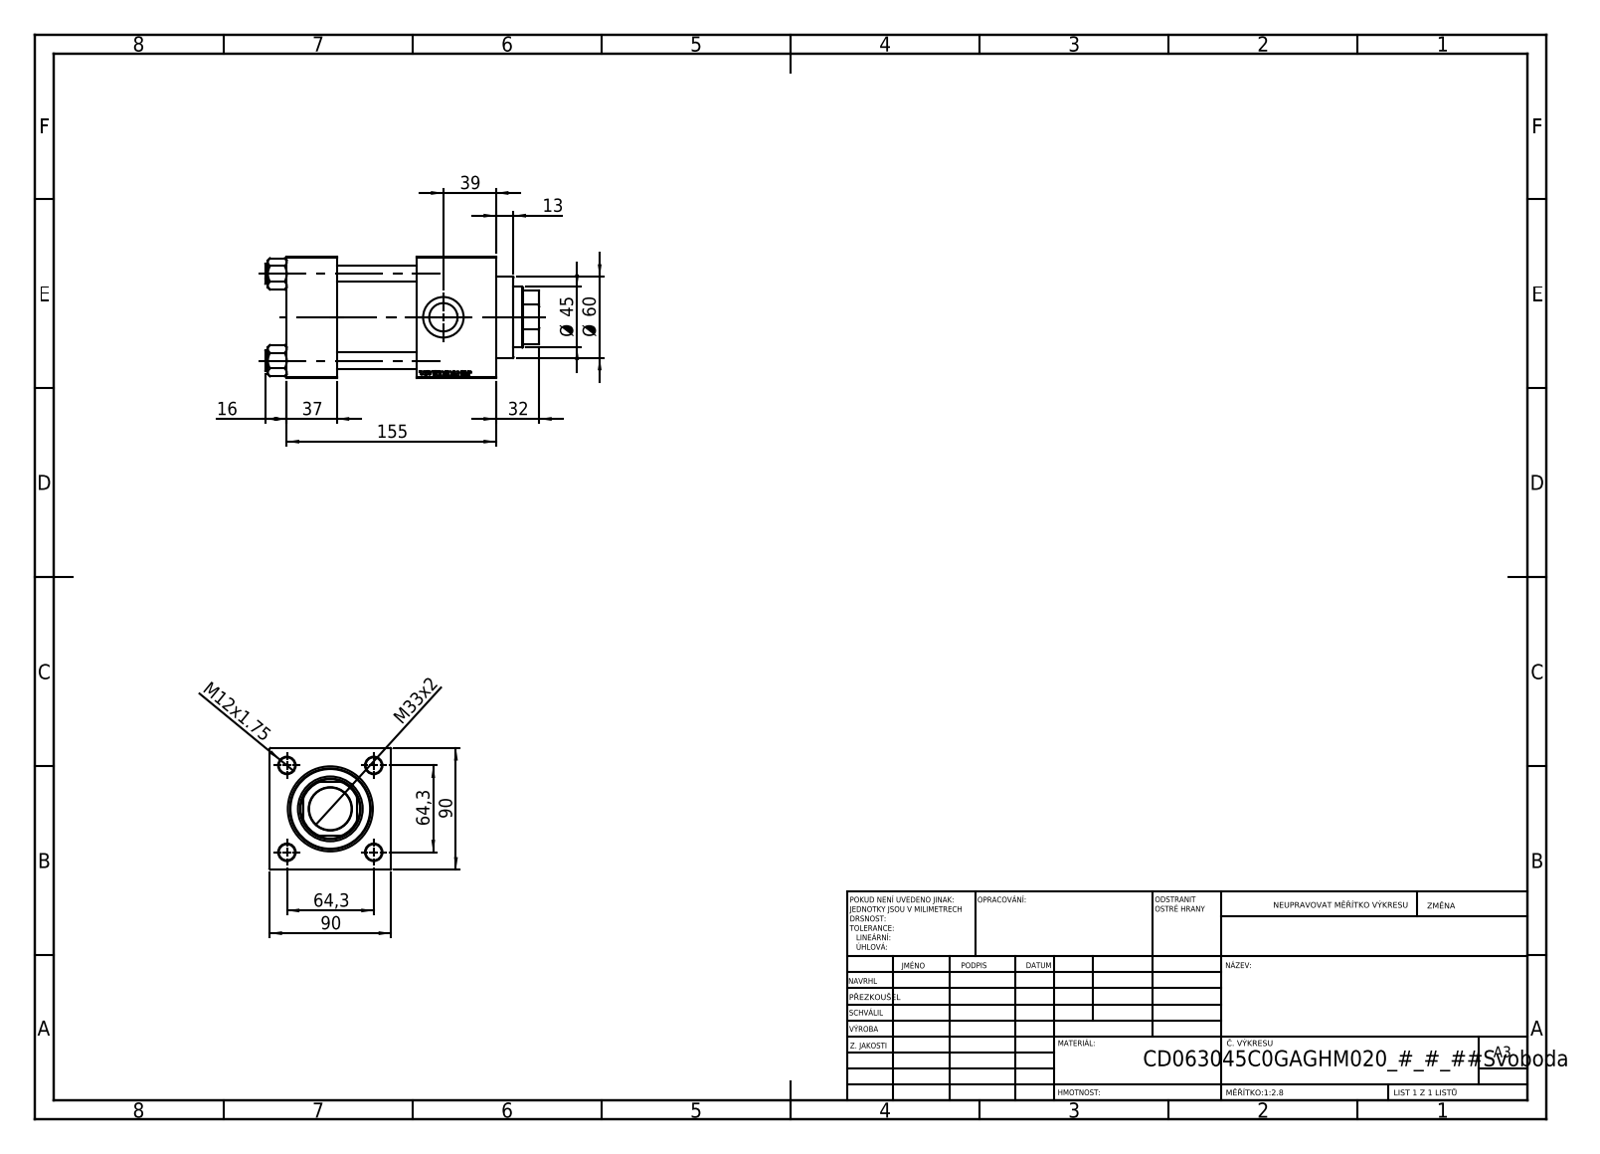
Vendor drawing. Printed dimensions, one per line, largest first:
155
90
90
64,3
64,3
Ø 60
Ø 45
39
37
M33x2
32
16
13
M12x1.75
